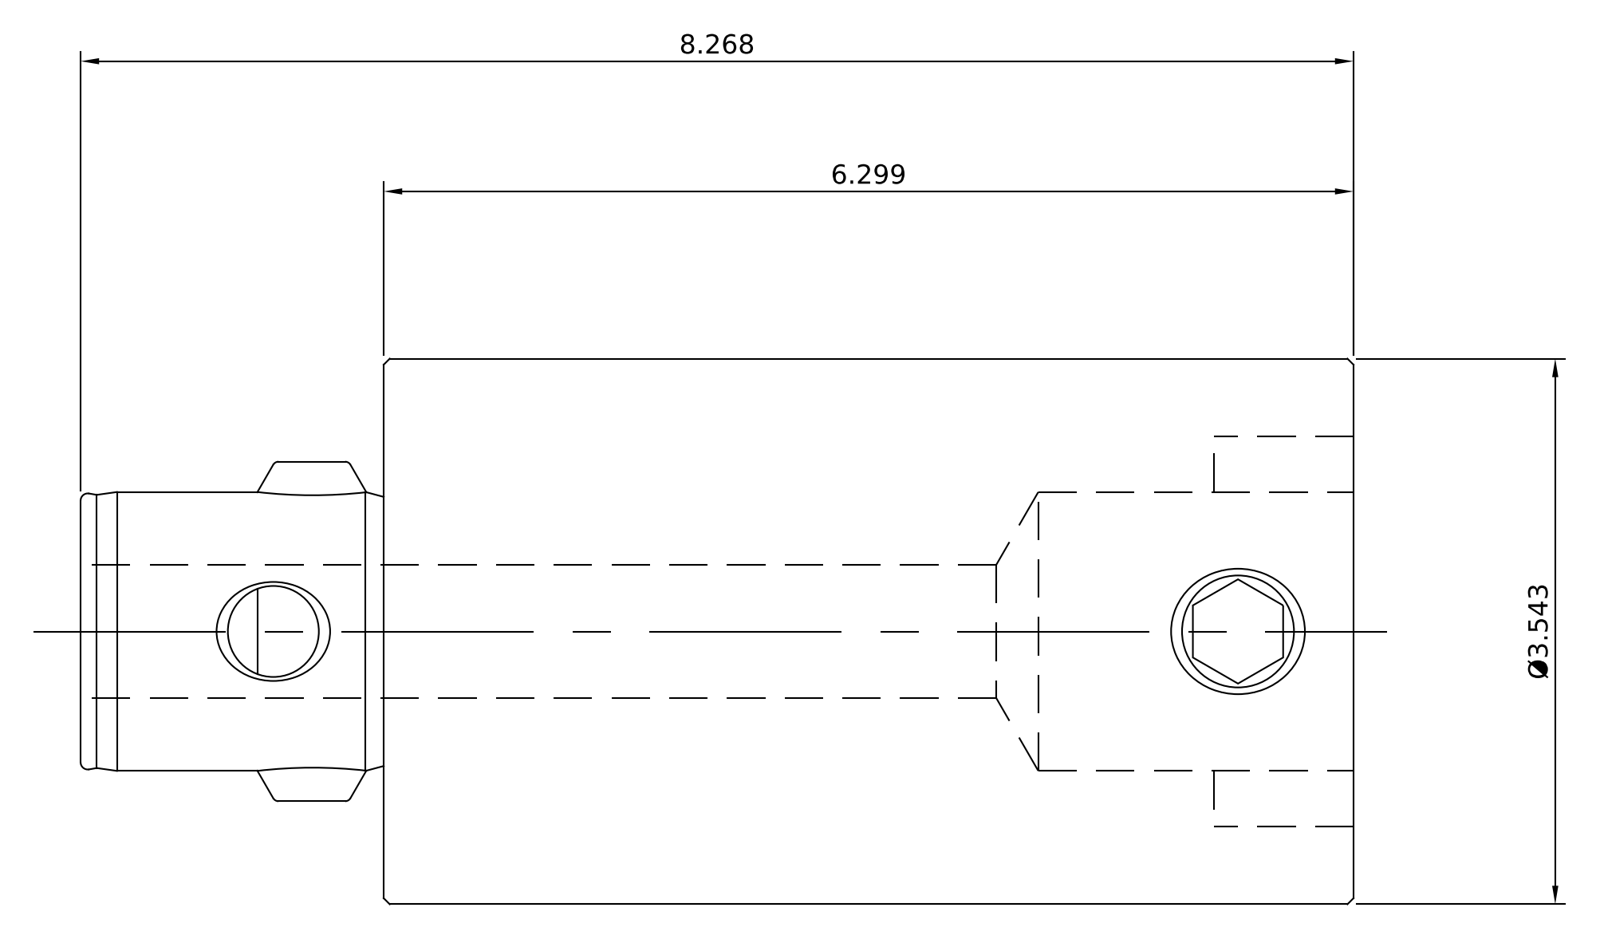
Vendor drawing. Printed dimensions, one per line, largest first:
8.268
6.299
Ø3.543
